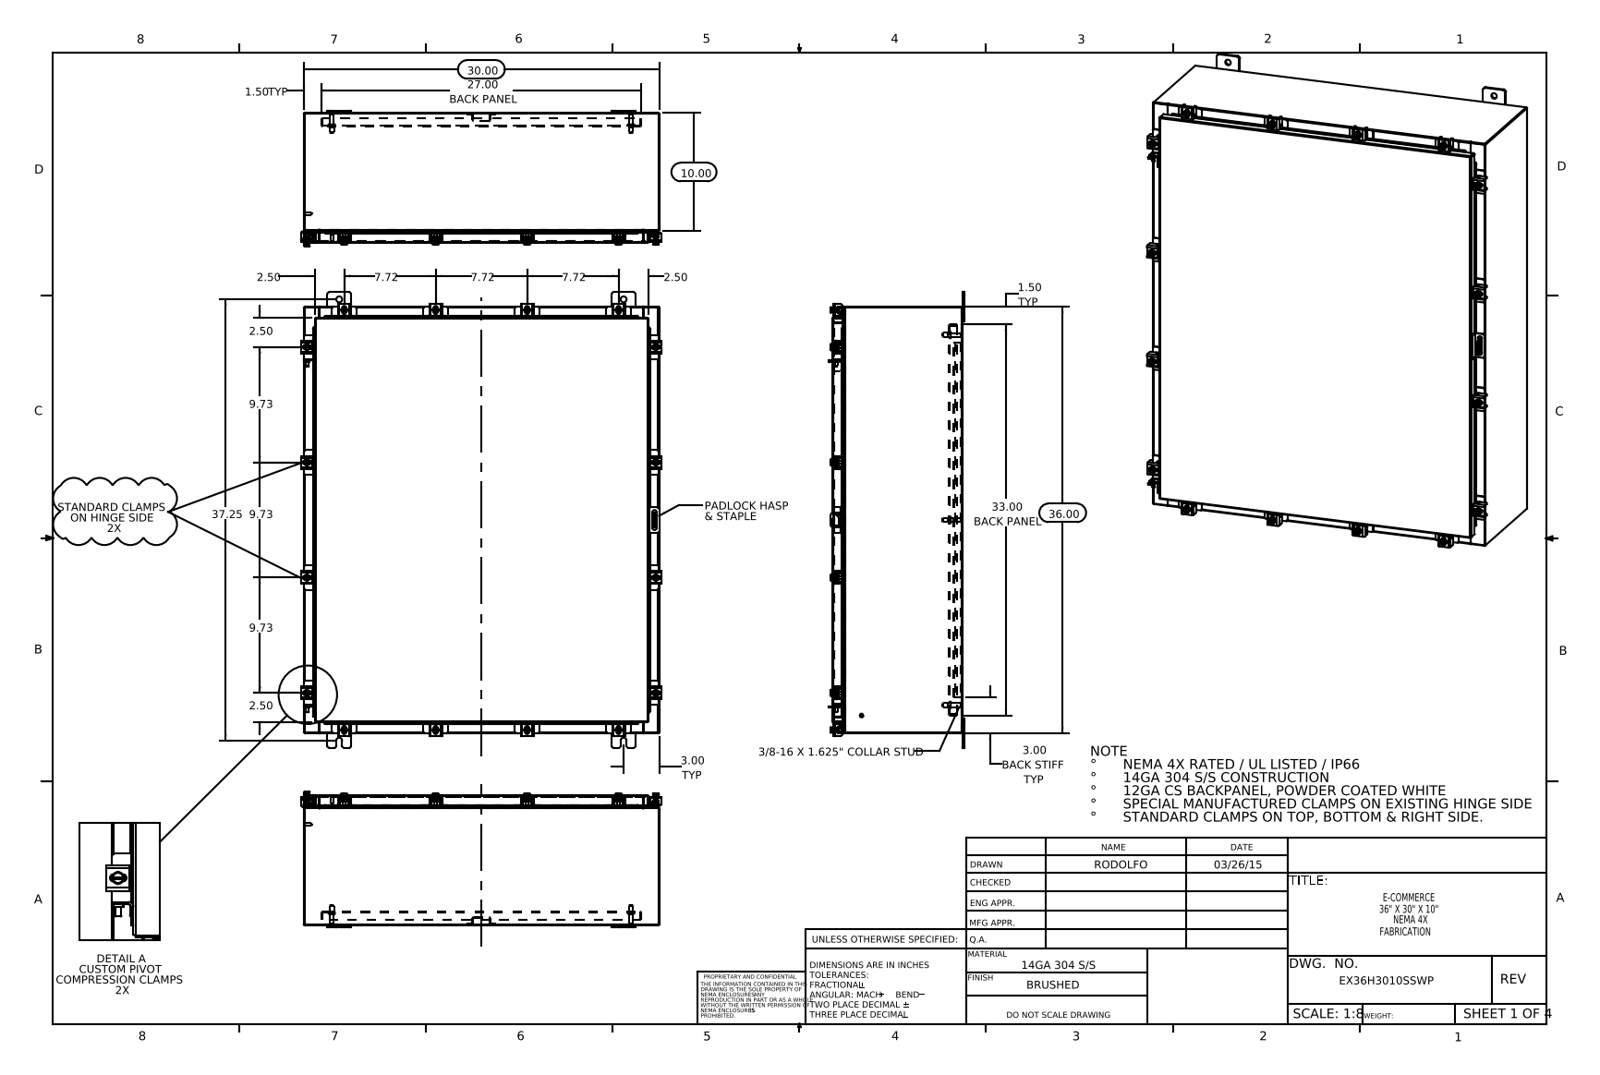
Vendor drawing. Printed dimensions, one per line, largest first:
37.25
36.00
33.00 BACK PANEL
30.00
27.00 BACK PANEL
10.00
9.73
9.73
9.73
7.72
7.72
7.72
3.00 TYP
3.00 BACK STIFF TYP
2.50
2.50
2.50
2.50
1.50 TYP
1.50 TYP
